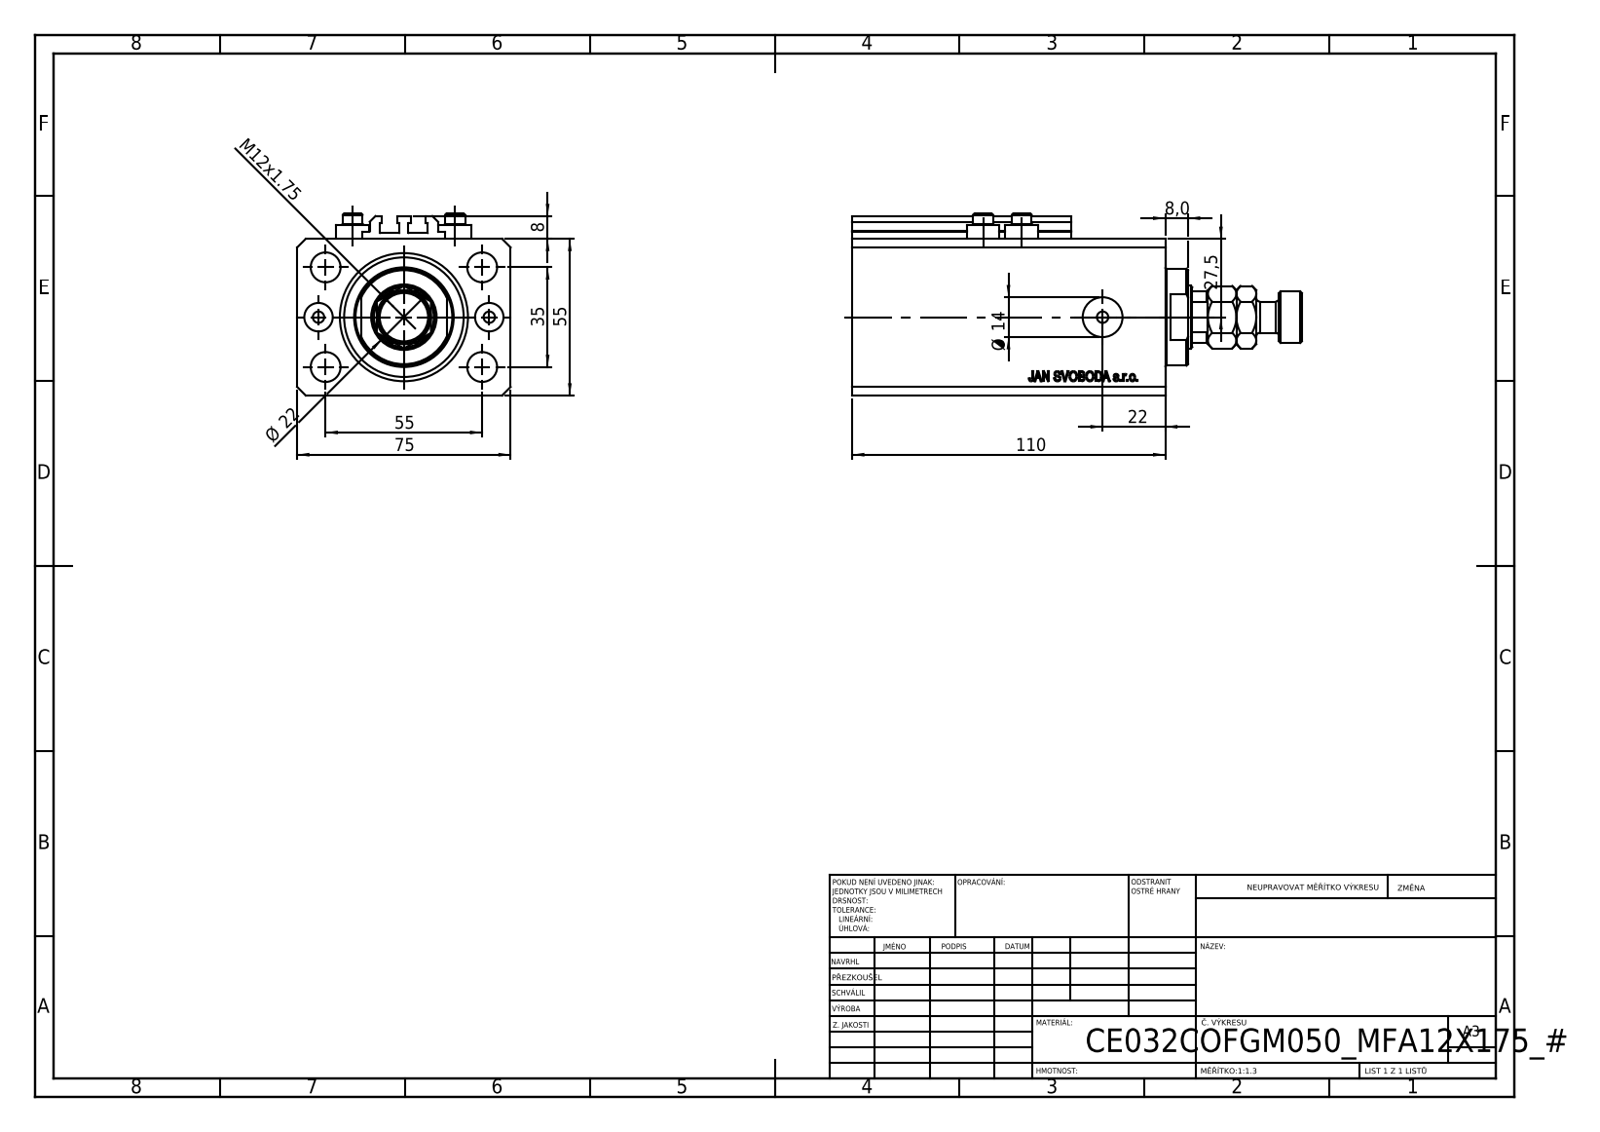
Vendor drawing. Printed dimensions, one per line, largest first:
110
75
55
55
35
27,5
Ø 22
22
Ø 14
M12x1.75
8
8,0
